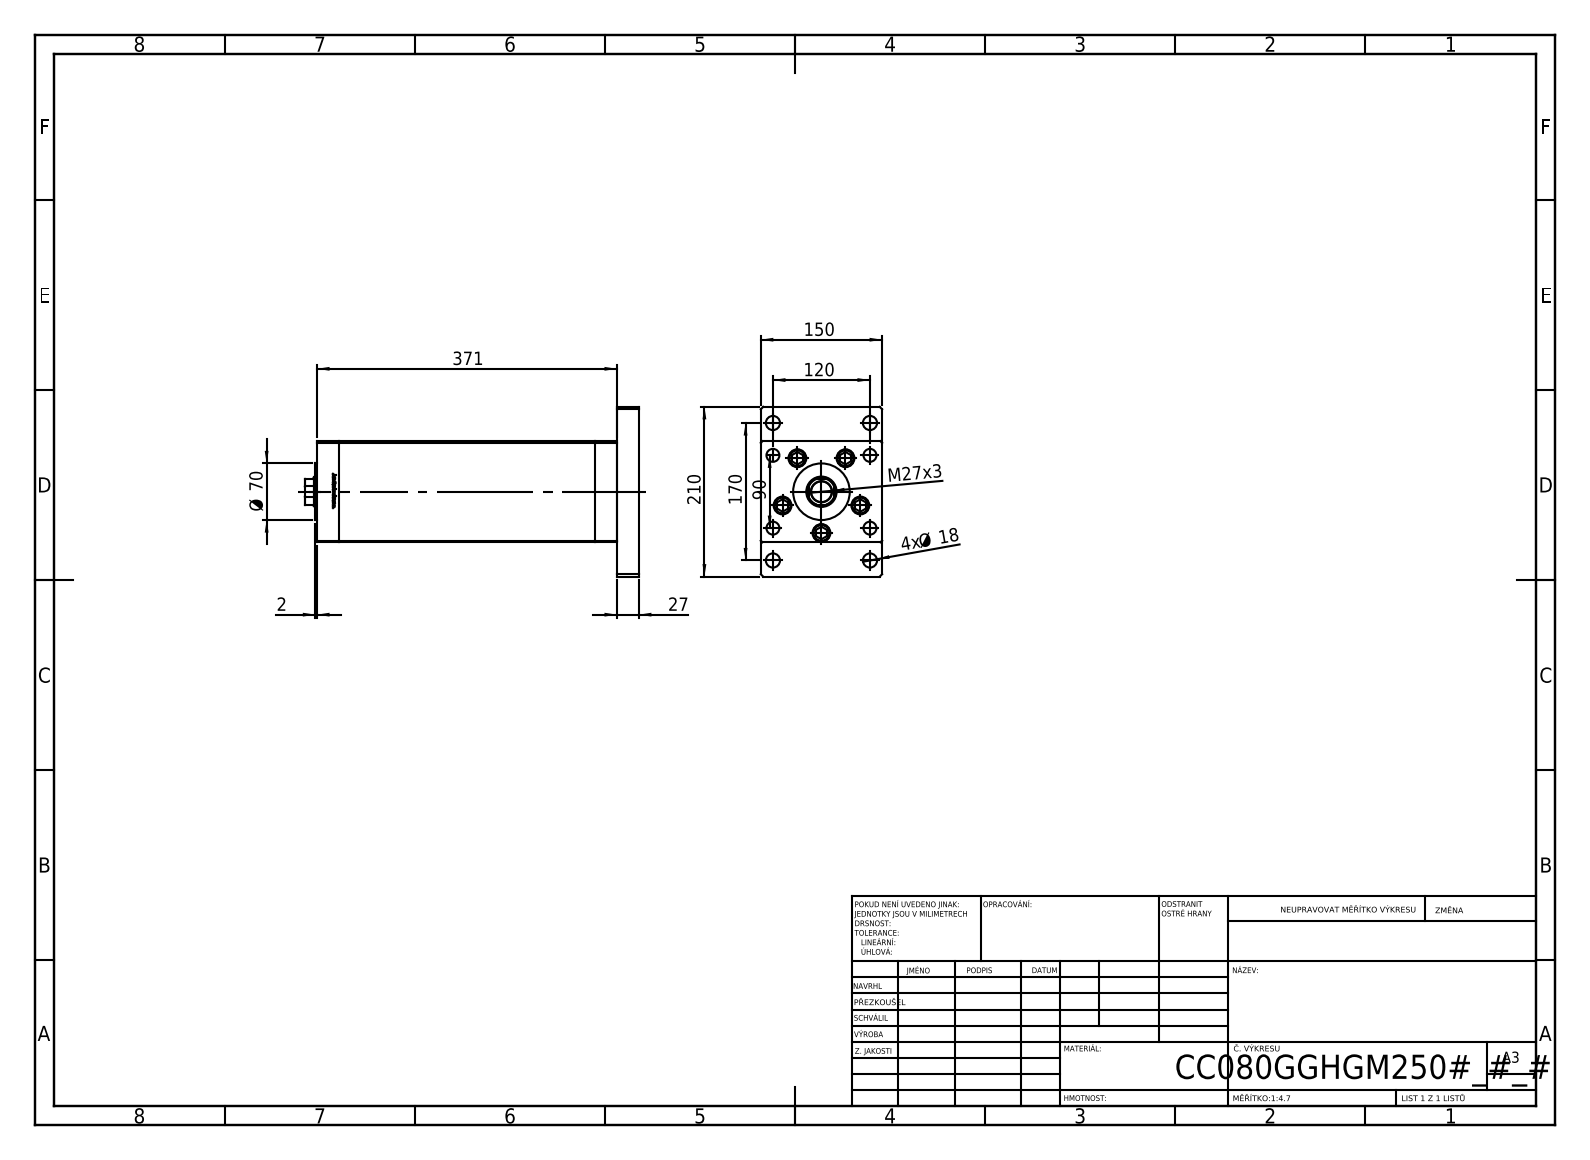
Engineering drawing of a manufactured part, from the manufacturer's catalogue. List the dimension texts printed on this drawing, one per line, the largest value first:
371
210
170
150
120
90
Ø 70
27
M27x3
4x Ø 18
2
